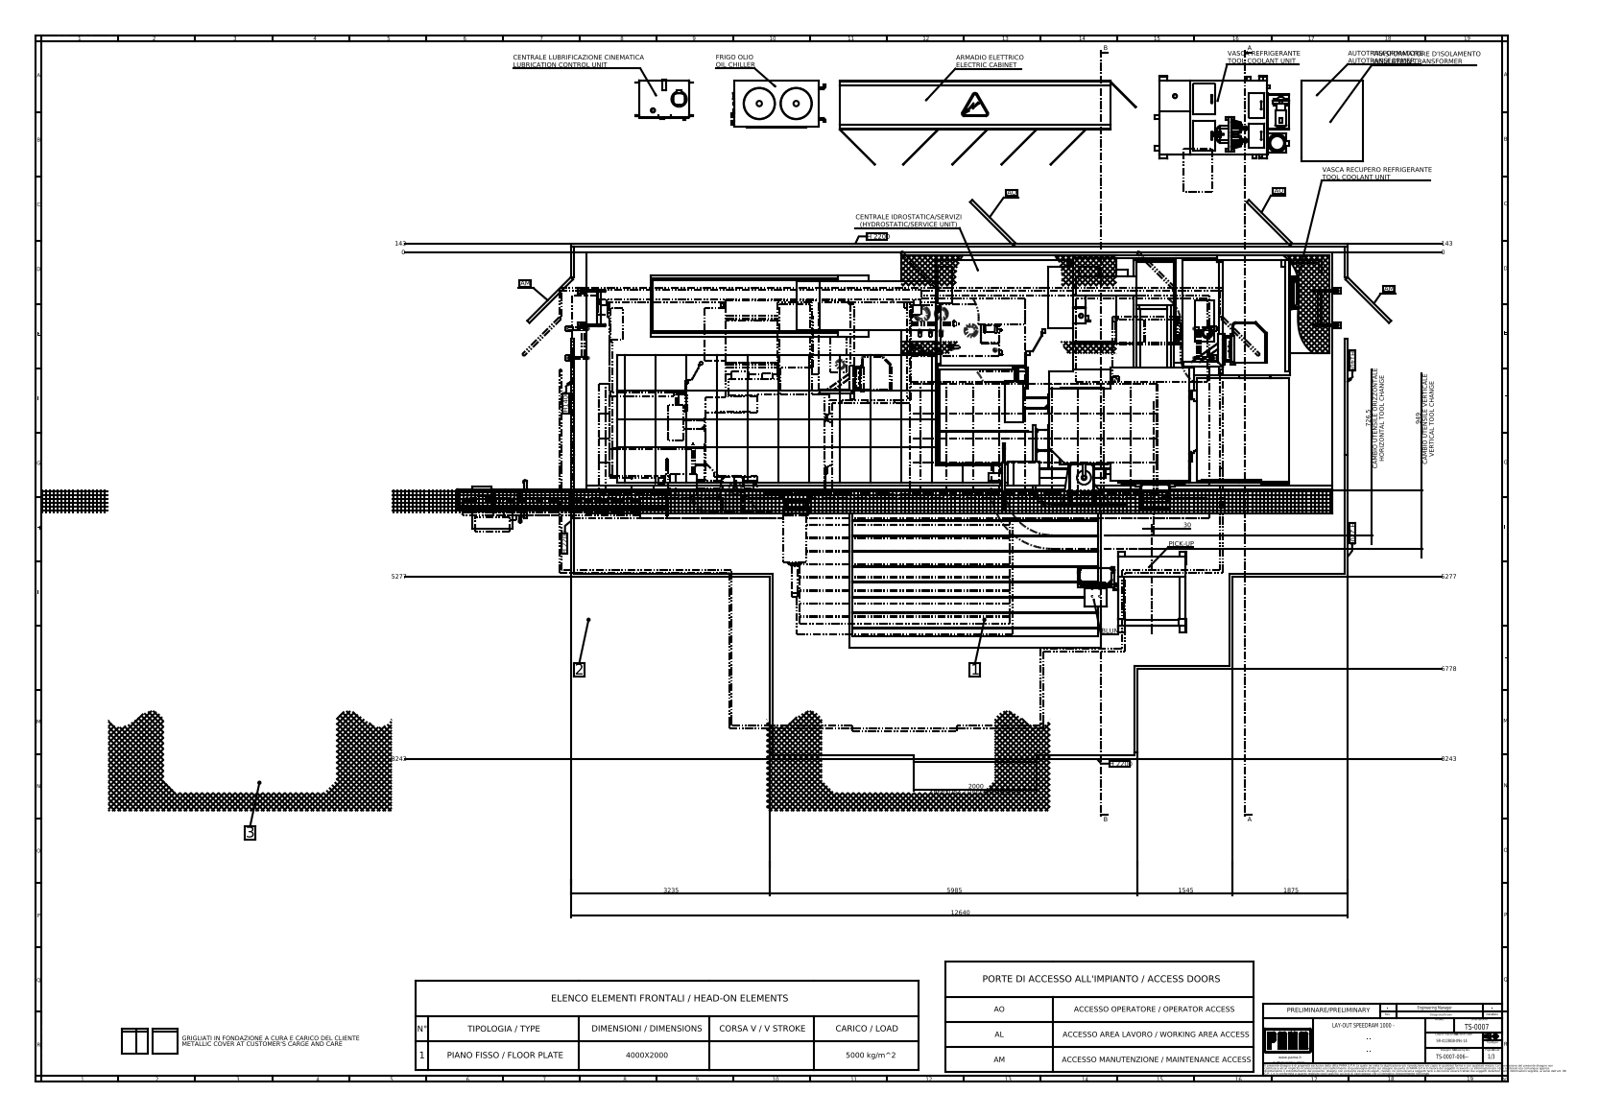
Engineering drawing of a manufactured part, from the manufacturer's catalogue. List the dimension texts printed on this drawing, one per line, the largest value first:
12640
8243
8243
6778
5985
5277
5277
3235
2000 APERTURA / USEFUL OPENING
1875
1545
949 CAMBIO UTENSILE VERTICALE VERTICAL TOOL CHANGE
726,5 CAMBIO UTENSILE ORIZZONTALE HORIZONTAL TOOL CHANGE
143
143
30
0
0
